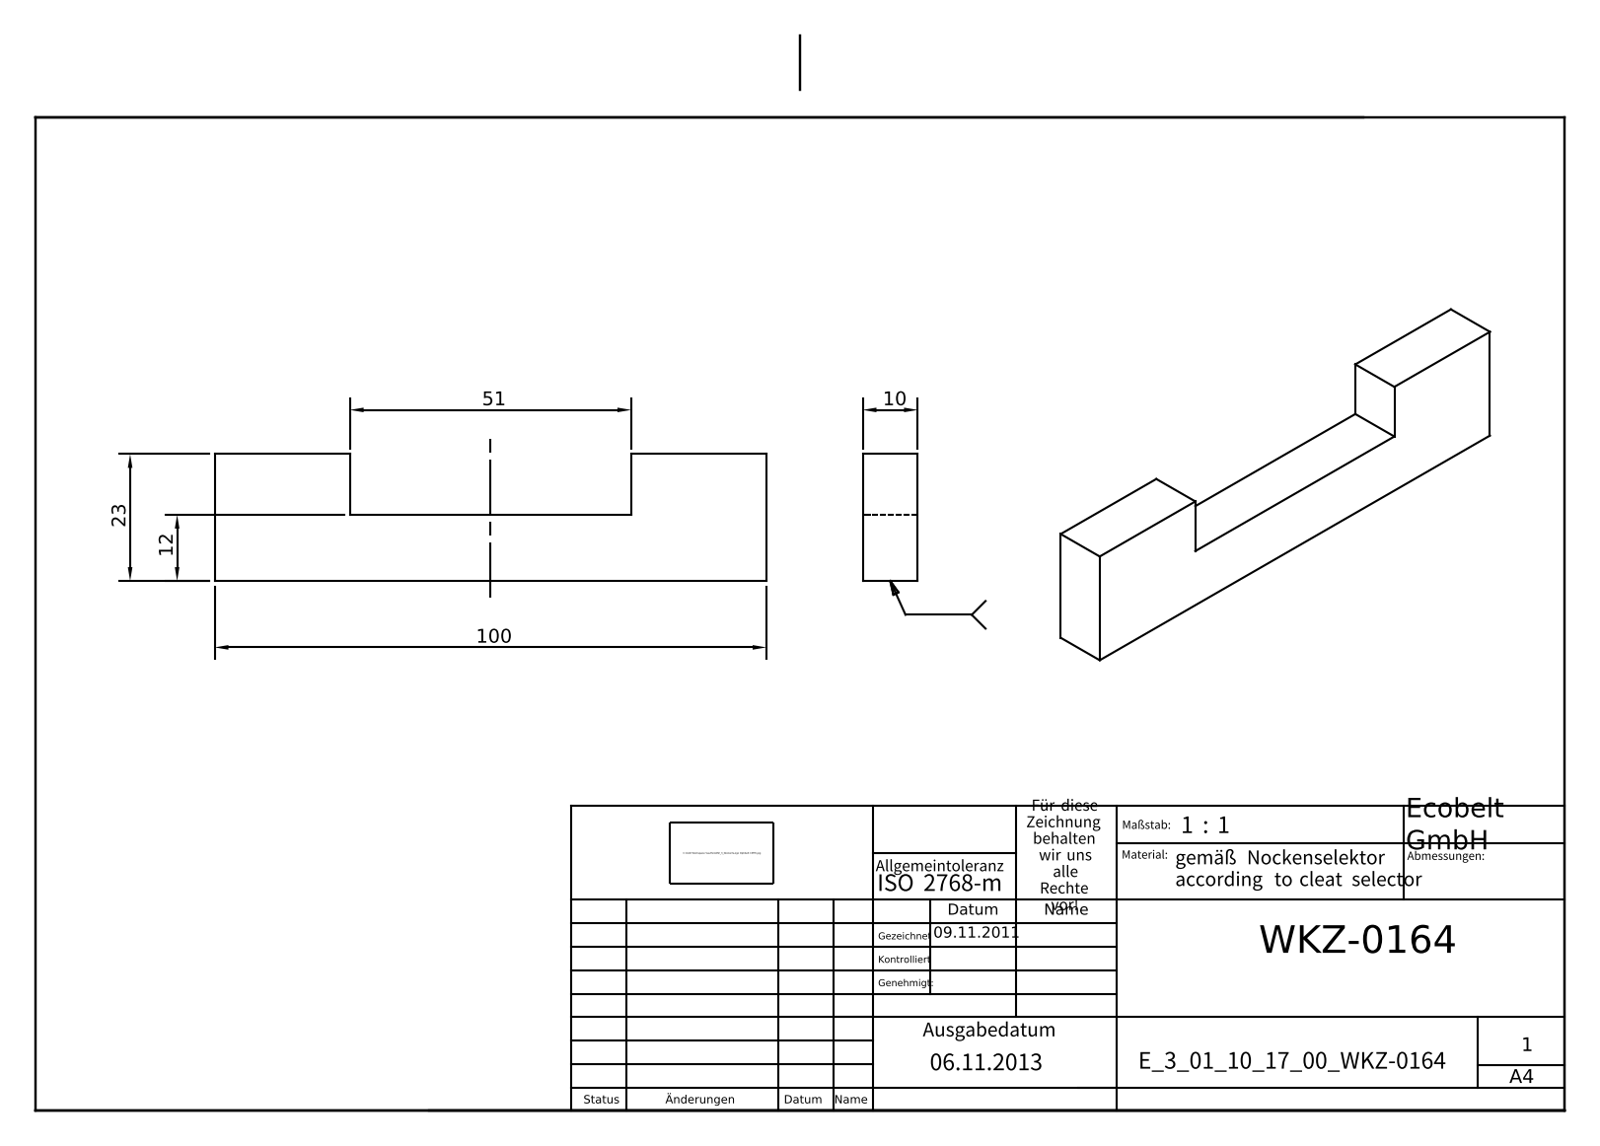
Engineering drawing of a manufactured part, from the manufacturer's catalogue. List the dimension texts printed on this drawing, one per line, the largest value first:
100
51
23
12
10
